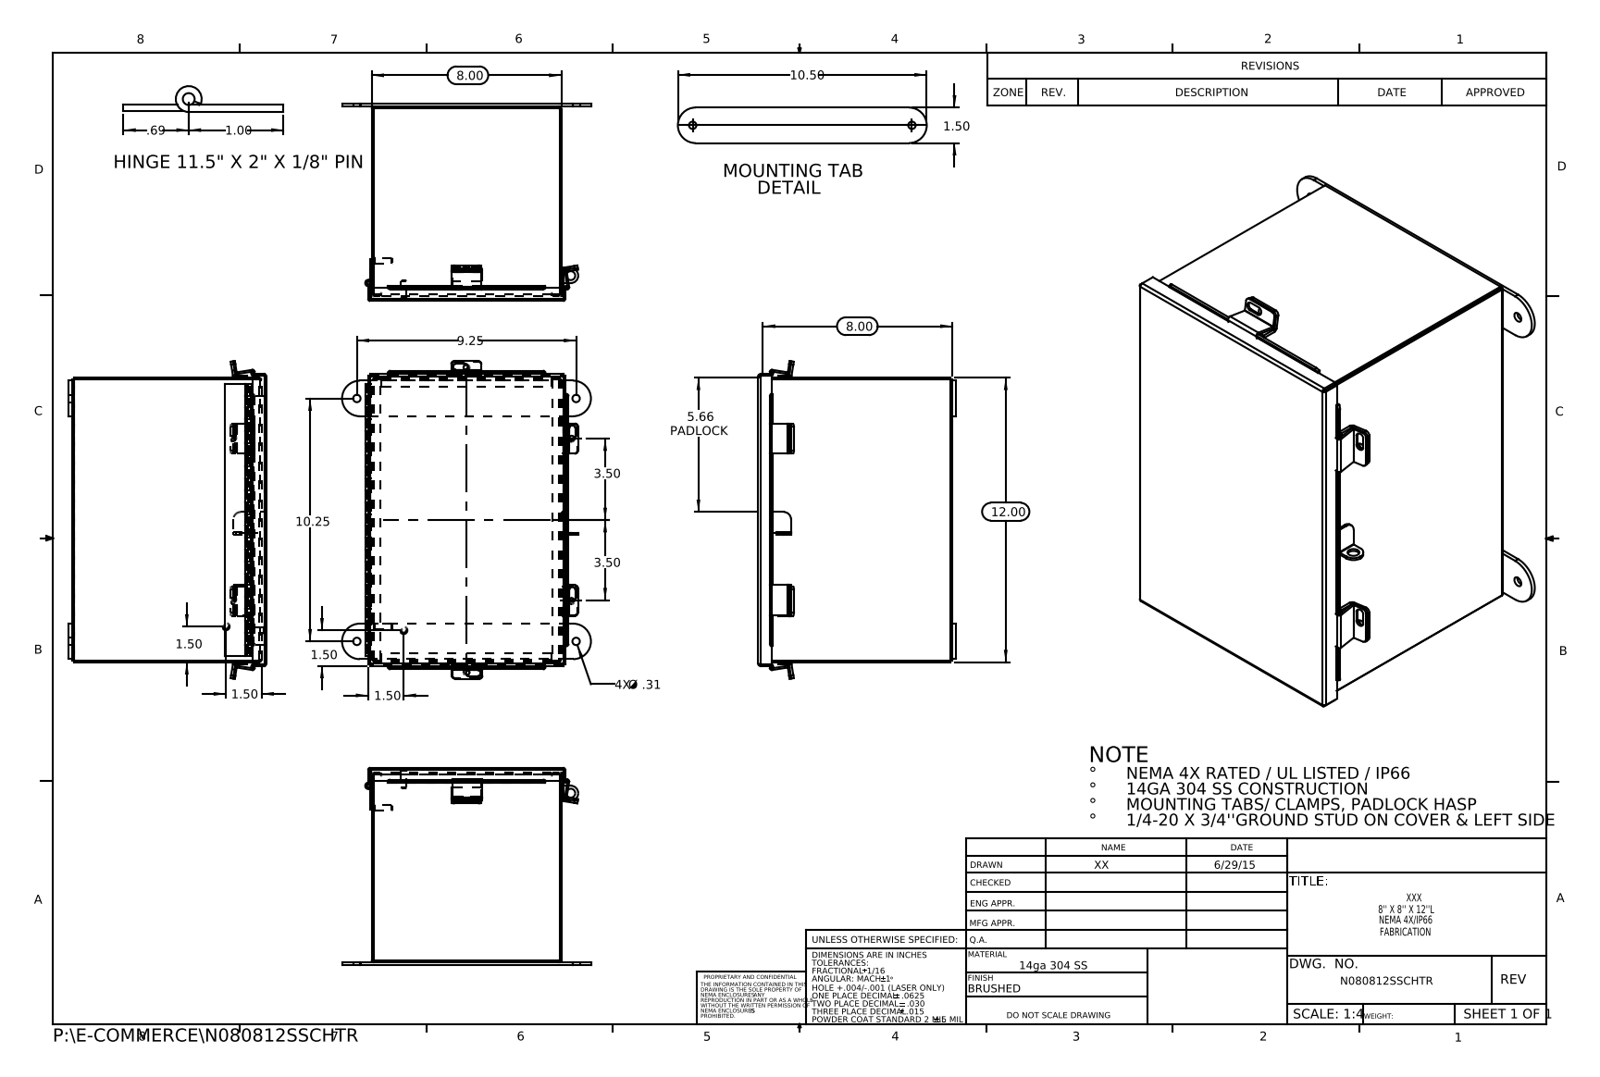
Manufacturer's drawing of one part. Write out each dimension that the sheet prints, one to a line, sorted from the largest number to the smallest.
12.00
10.50
10.25
9.25
8.00
8.00
5.66 PADLOCK
3.50
3.50
1.50
1.50
1.50
1.50
1.50
1.00
.69
4X Ø .31
